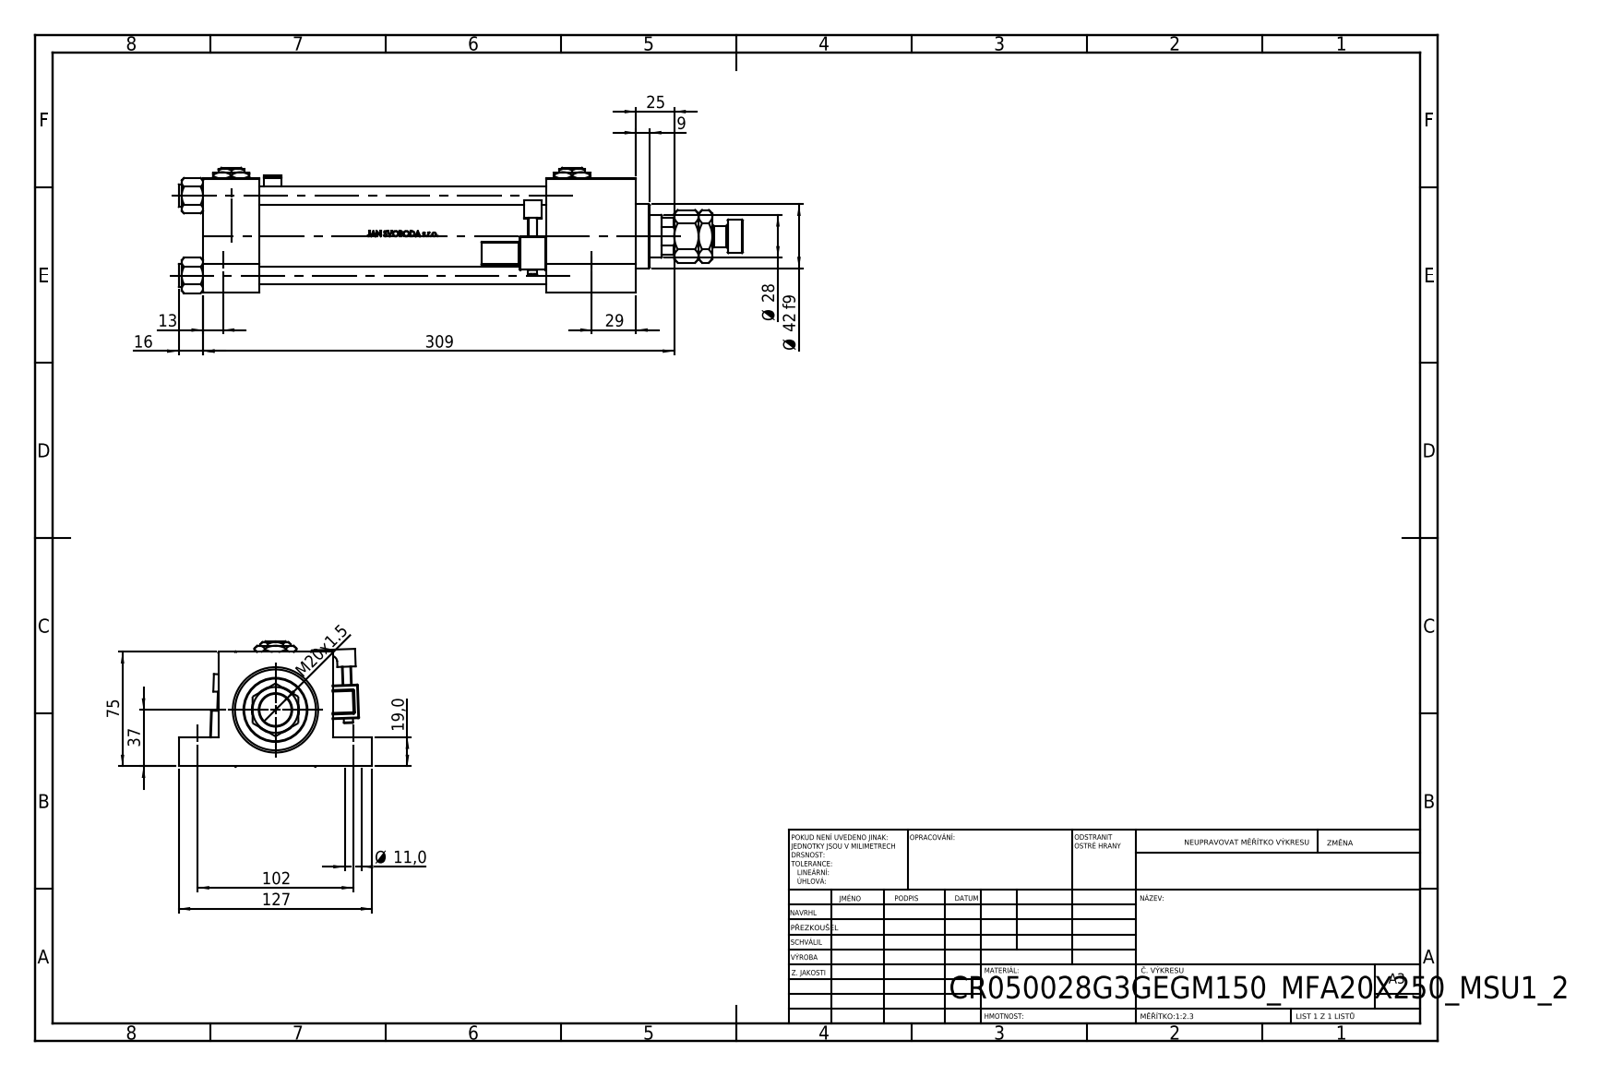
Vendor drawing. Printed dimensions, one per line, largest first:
309
127
102
75
Ø 42 f9
37
29
Ø 28
25
M20x1.5
19,0
16
13
Ø 11,0
9
